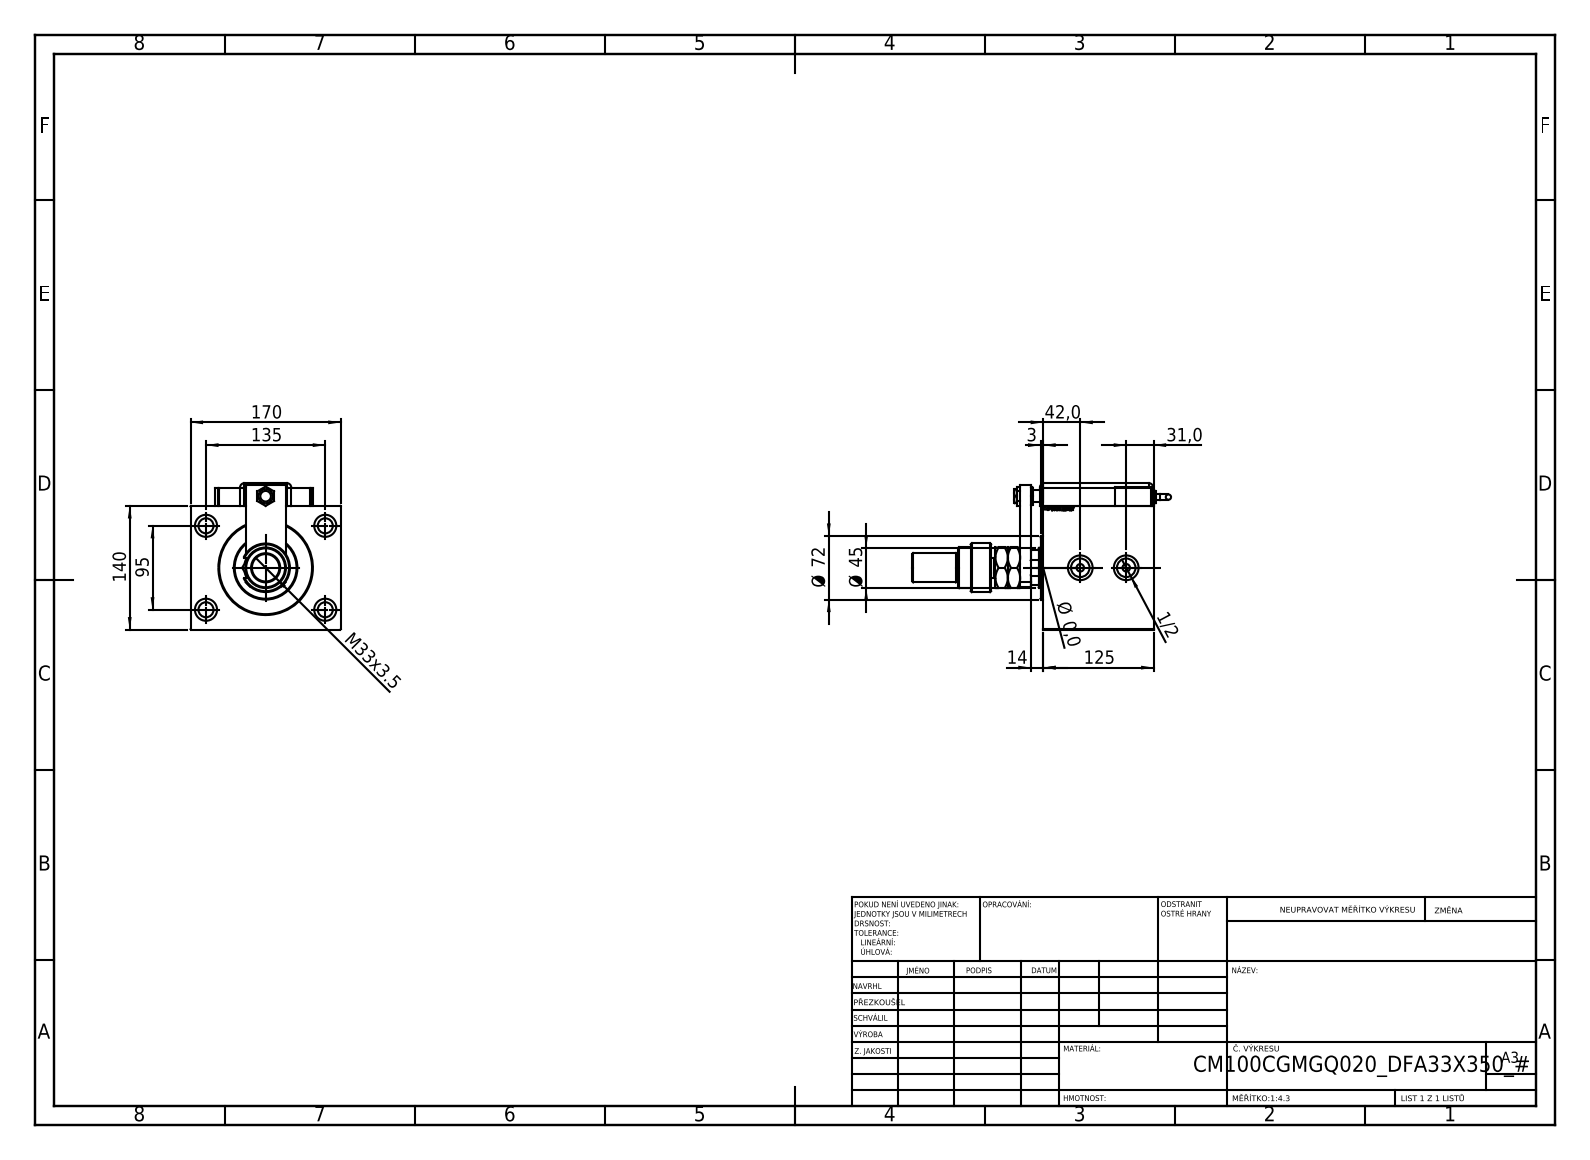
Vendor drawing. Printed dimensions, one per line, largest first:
170
140
135
125
95
Ø 72
Ø 45
42,0
M33x3.5
31,0
14
3
1/2
